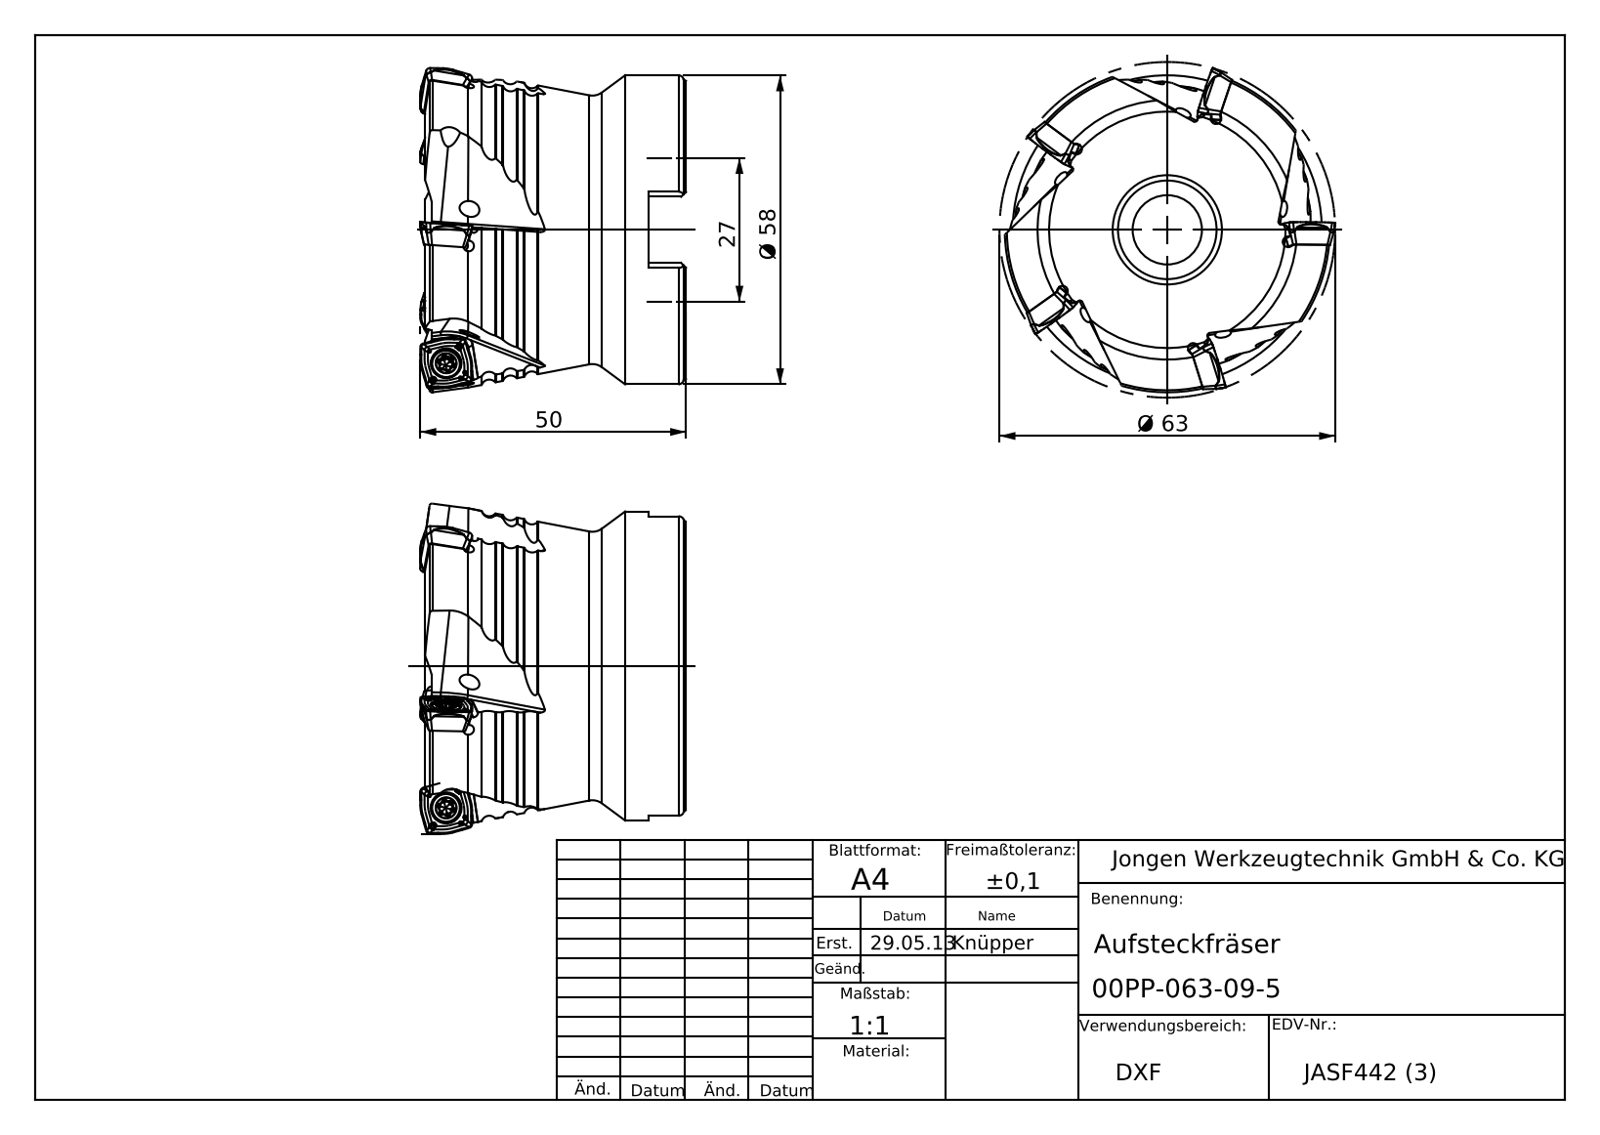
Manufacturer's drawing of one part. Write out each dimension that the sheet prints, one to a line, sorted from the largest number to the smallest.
Ø 63
Ø 58
50
27
